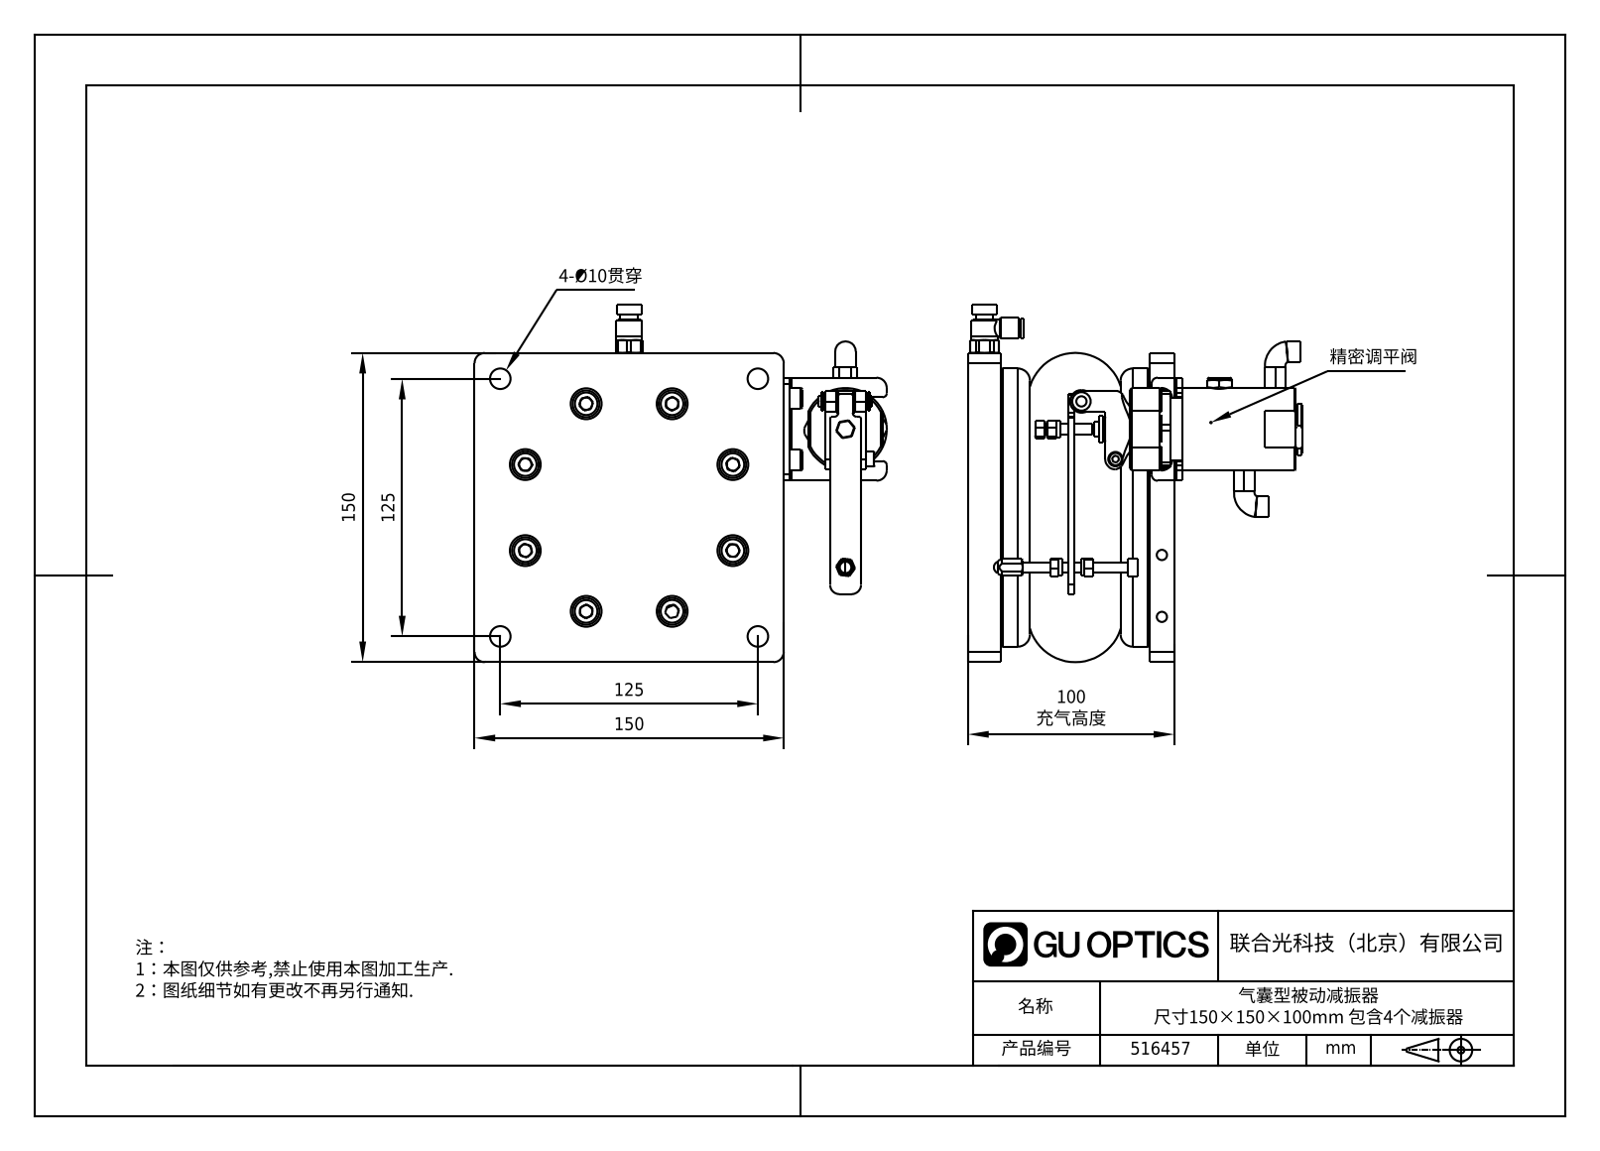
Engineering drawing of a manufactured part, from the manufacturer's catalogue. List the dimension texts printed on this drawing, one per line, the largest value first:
150
150
125
125
100 充气高度
